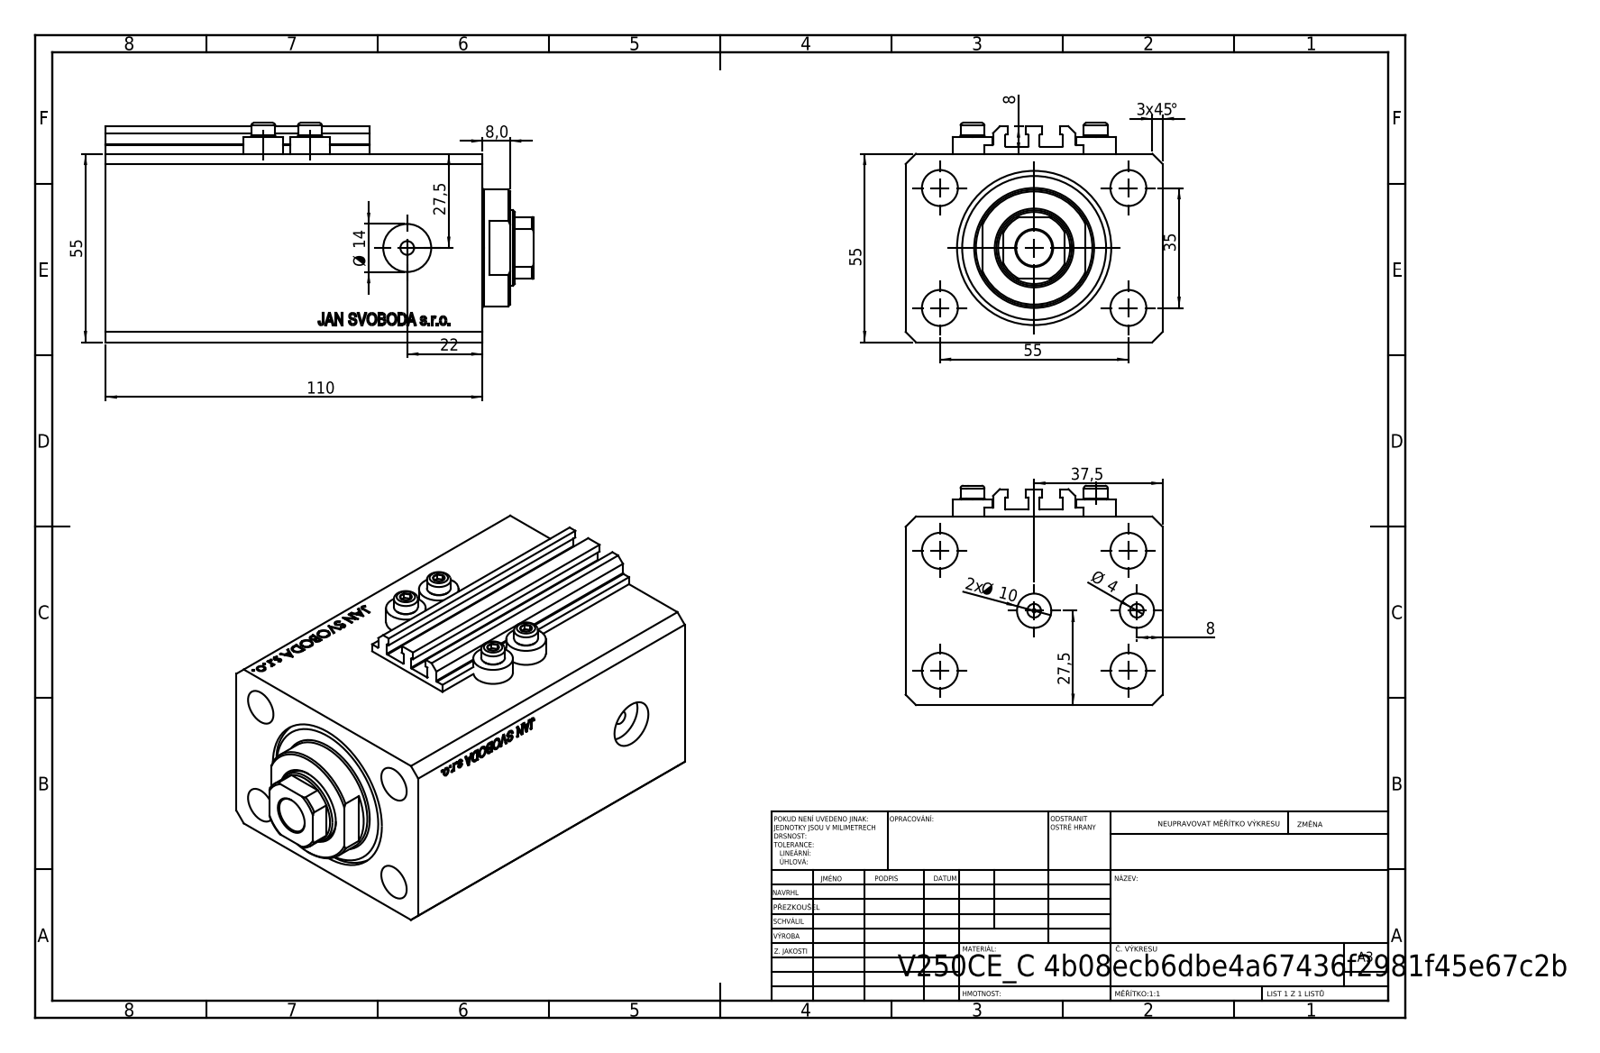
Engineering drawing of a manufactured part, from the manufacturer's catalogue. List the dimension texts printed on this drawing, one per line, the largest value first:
110
55
55
55
3 x45 °
37,5
35
27,5
27,5
22
Ø 14
2x Ø 10
8
8
8,0
Ø 4
